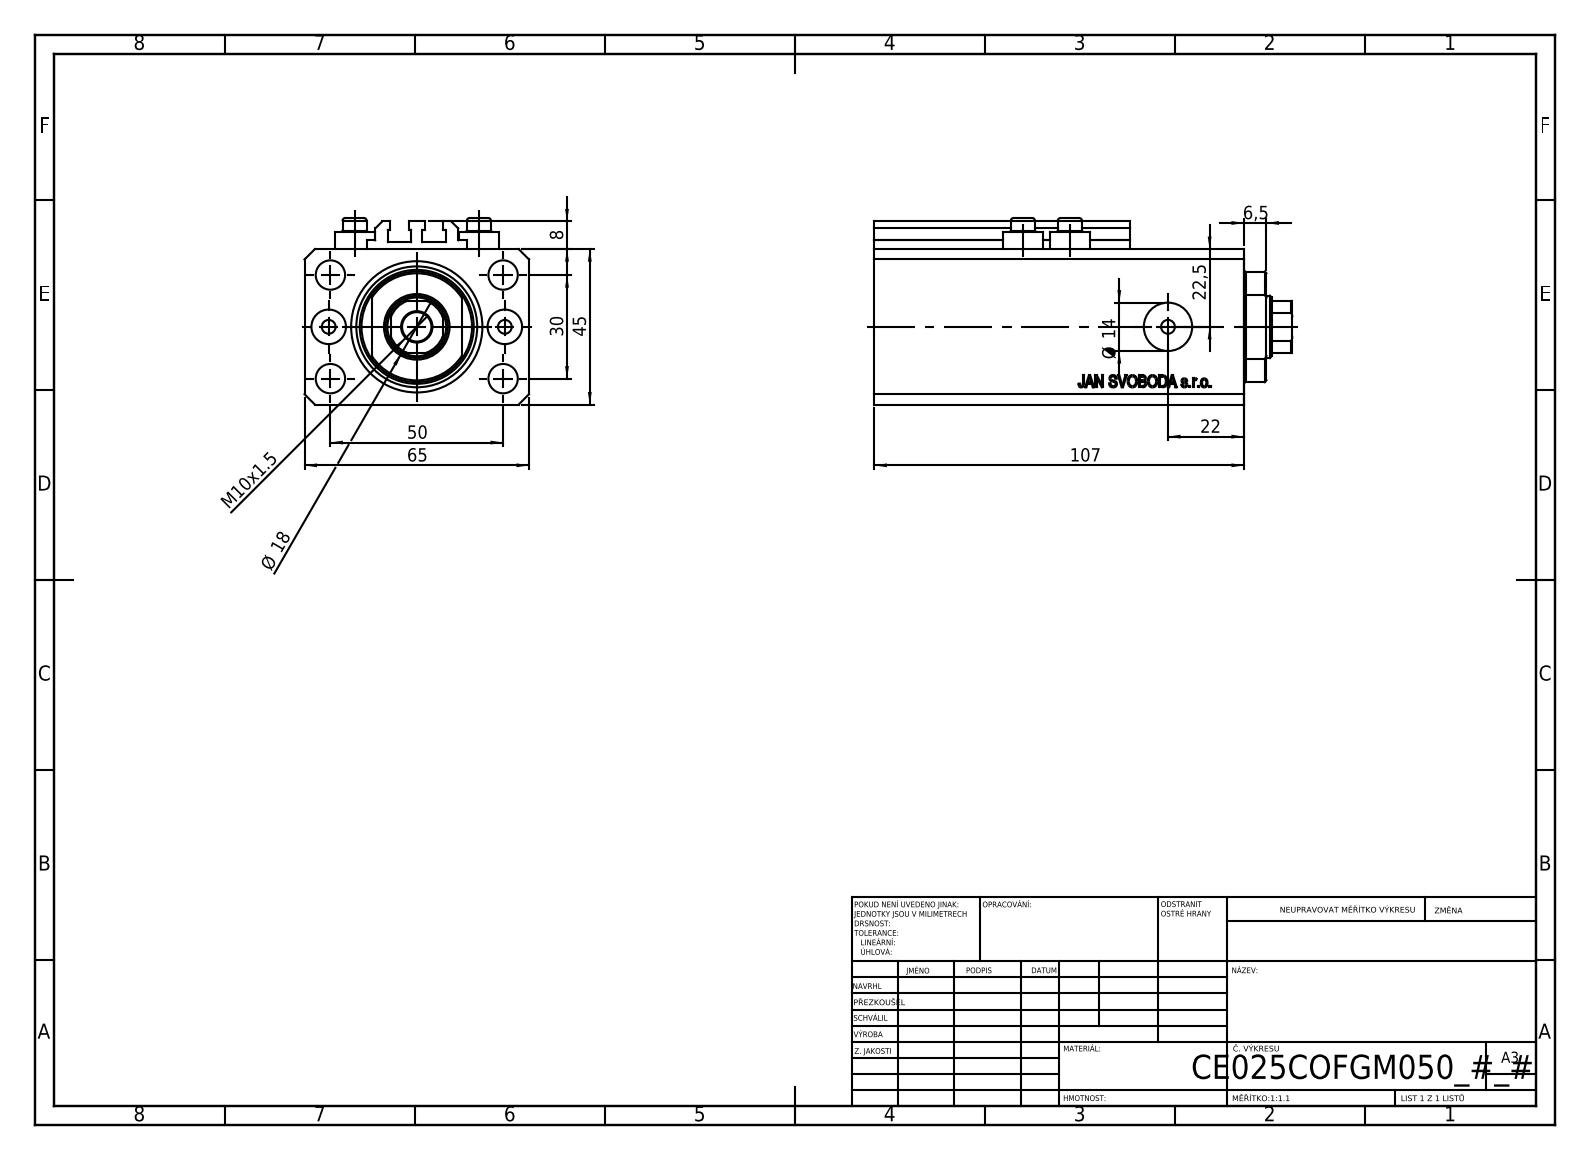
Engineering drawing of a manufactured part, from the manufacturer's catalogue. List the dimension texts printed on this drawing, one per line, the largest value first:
107
65
50
45
30
22,5
22
Ø 18
Ø 14
M10x1.5
8
6,5
